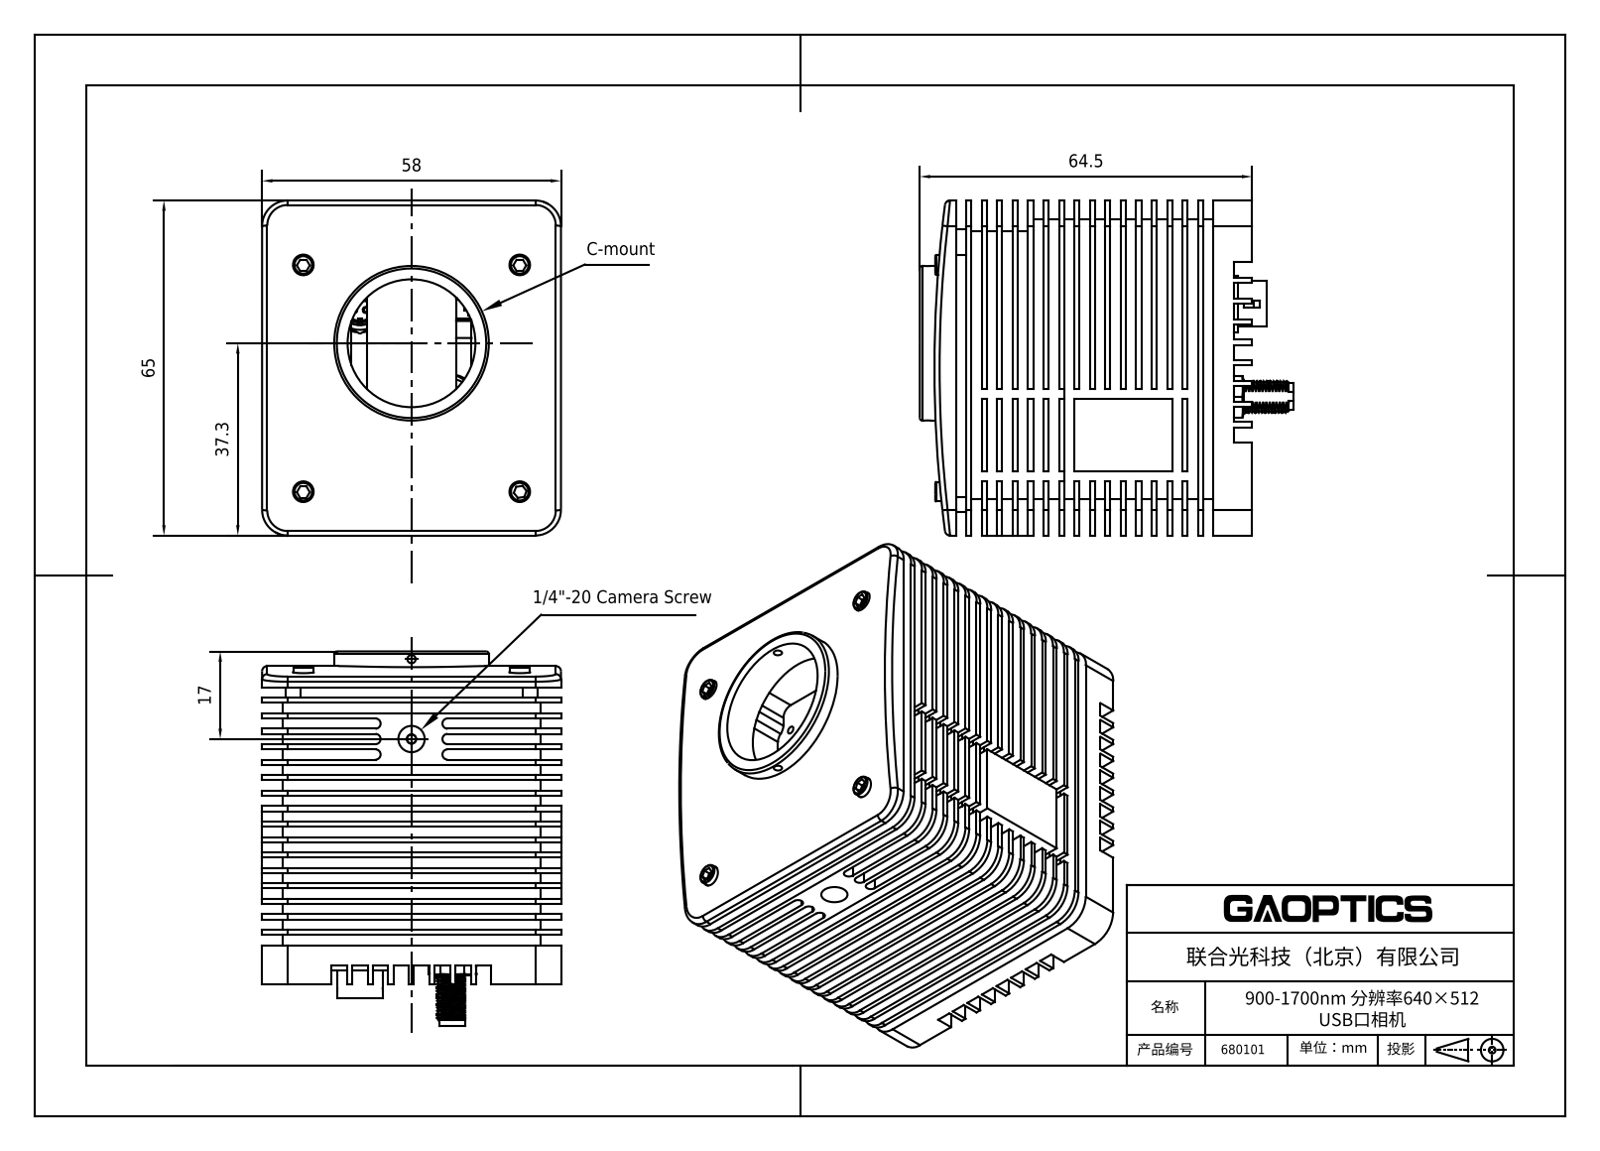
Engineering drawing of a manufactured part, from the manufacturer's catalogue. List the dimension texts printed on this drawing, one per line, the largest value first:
65
64.5
58
37.3
17
1/4"-20 Camera Screw
C-mount
